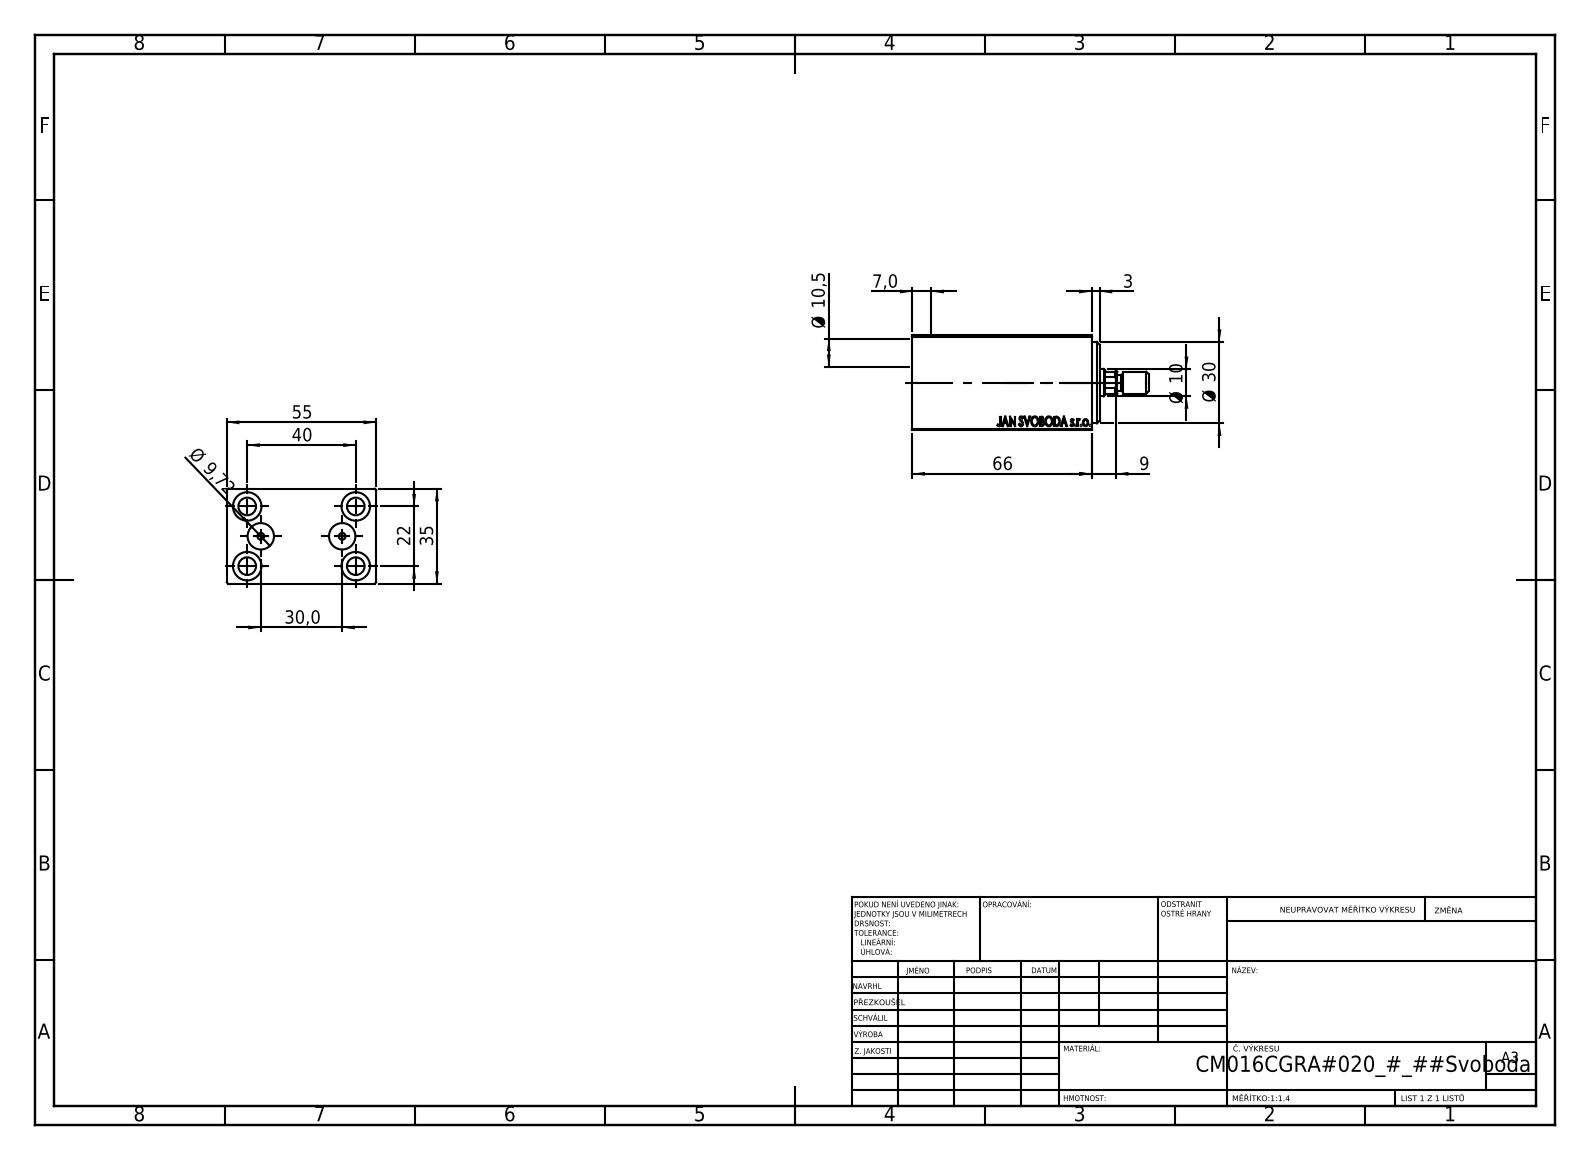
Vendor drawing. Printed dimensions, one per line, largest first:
66
55
40
35
Ø 30
30,0
22
Ø 10,5
Ø 10
Ø 9,72
9
7,0
3
